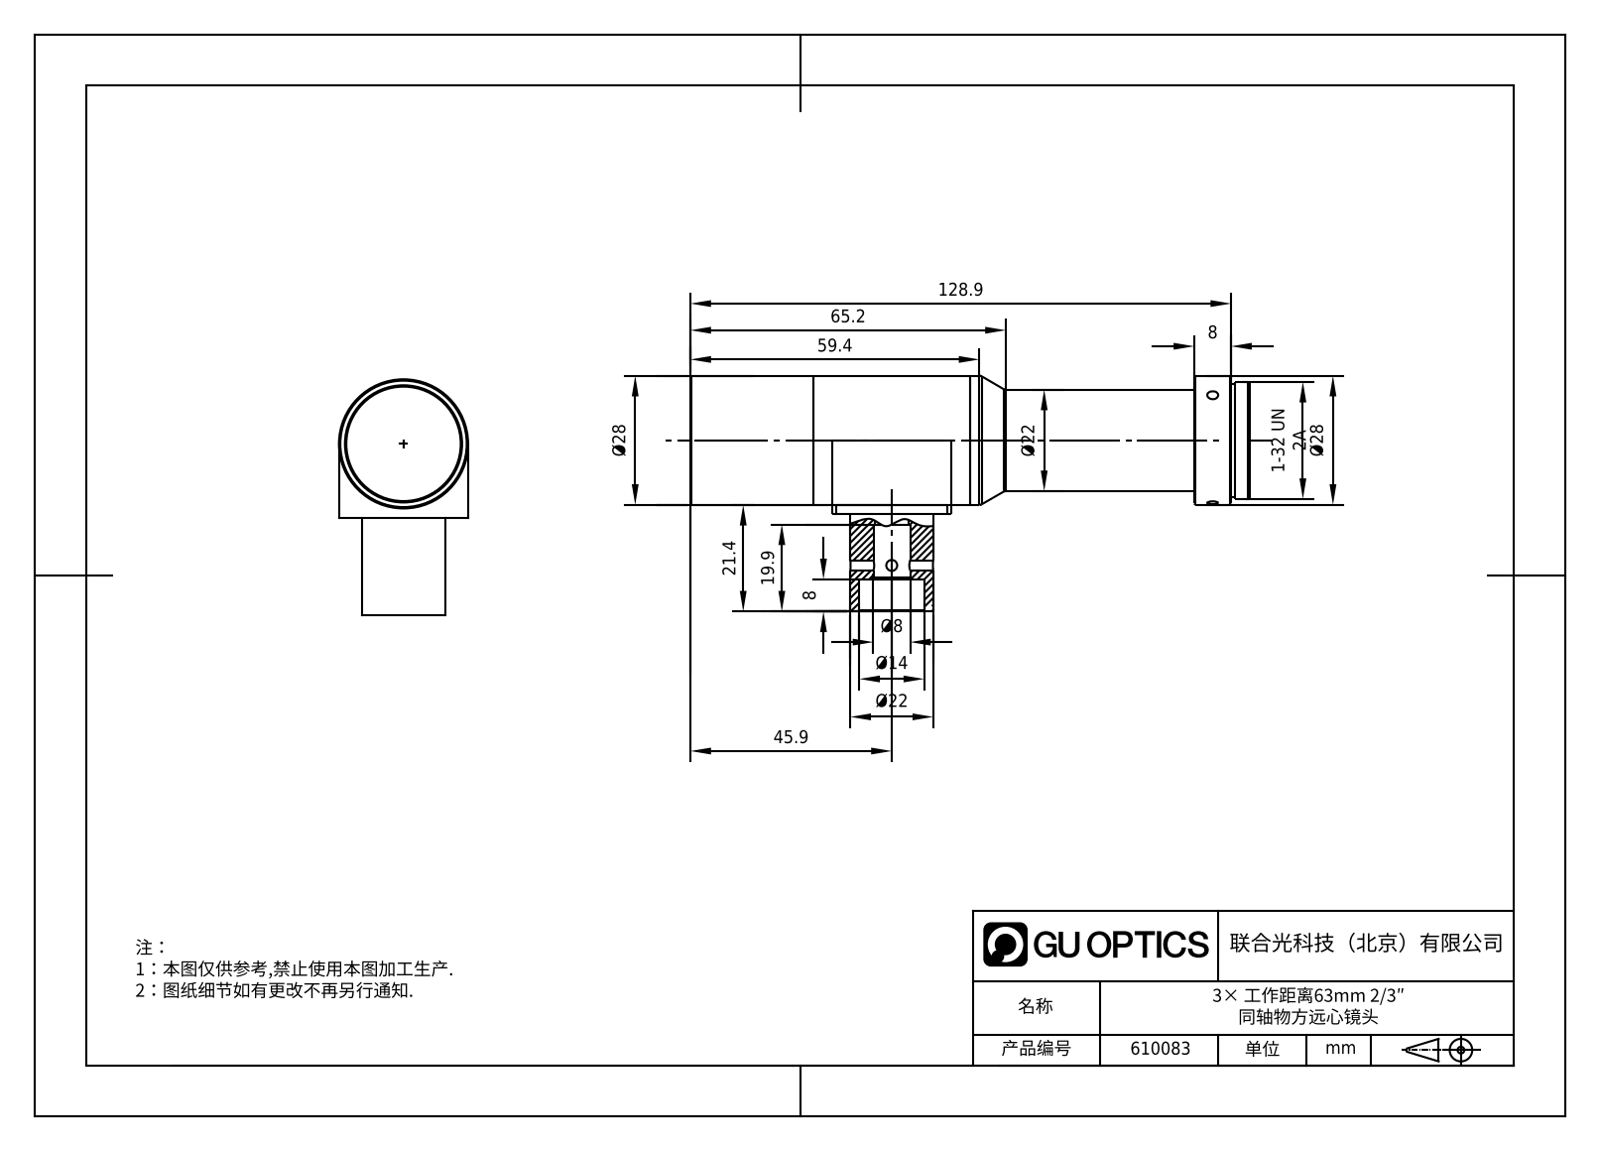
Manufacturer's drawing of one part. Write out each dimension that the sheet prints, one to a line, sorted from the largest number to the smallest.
128.9
65.2
59.4
45.9
Ø28
Ø28
Ø22
Ø22
21.4
19.9
Ø14
8
Ø8
8
1-32 UN 2A
